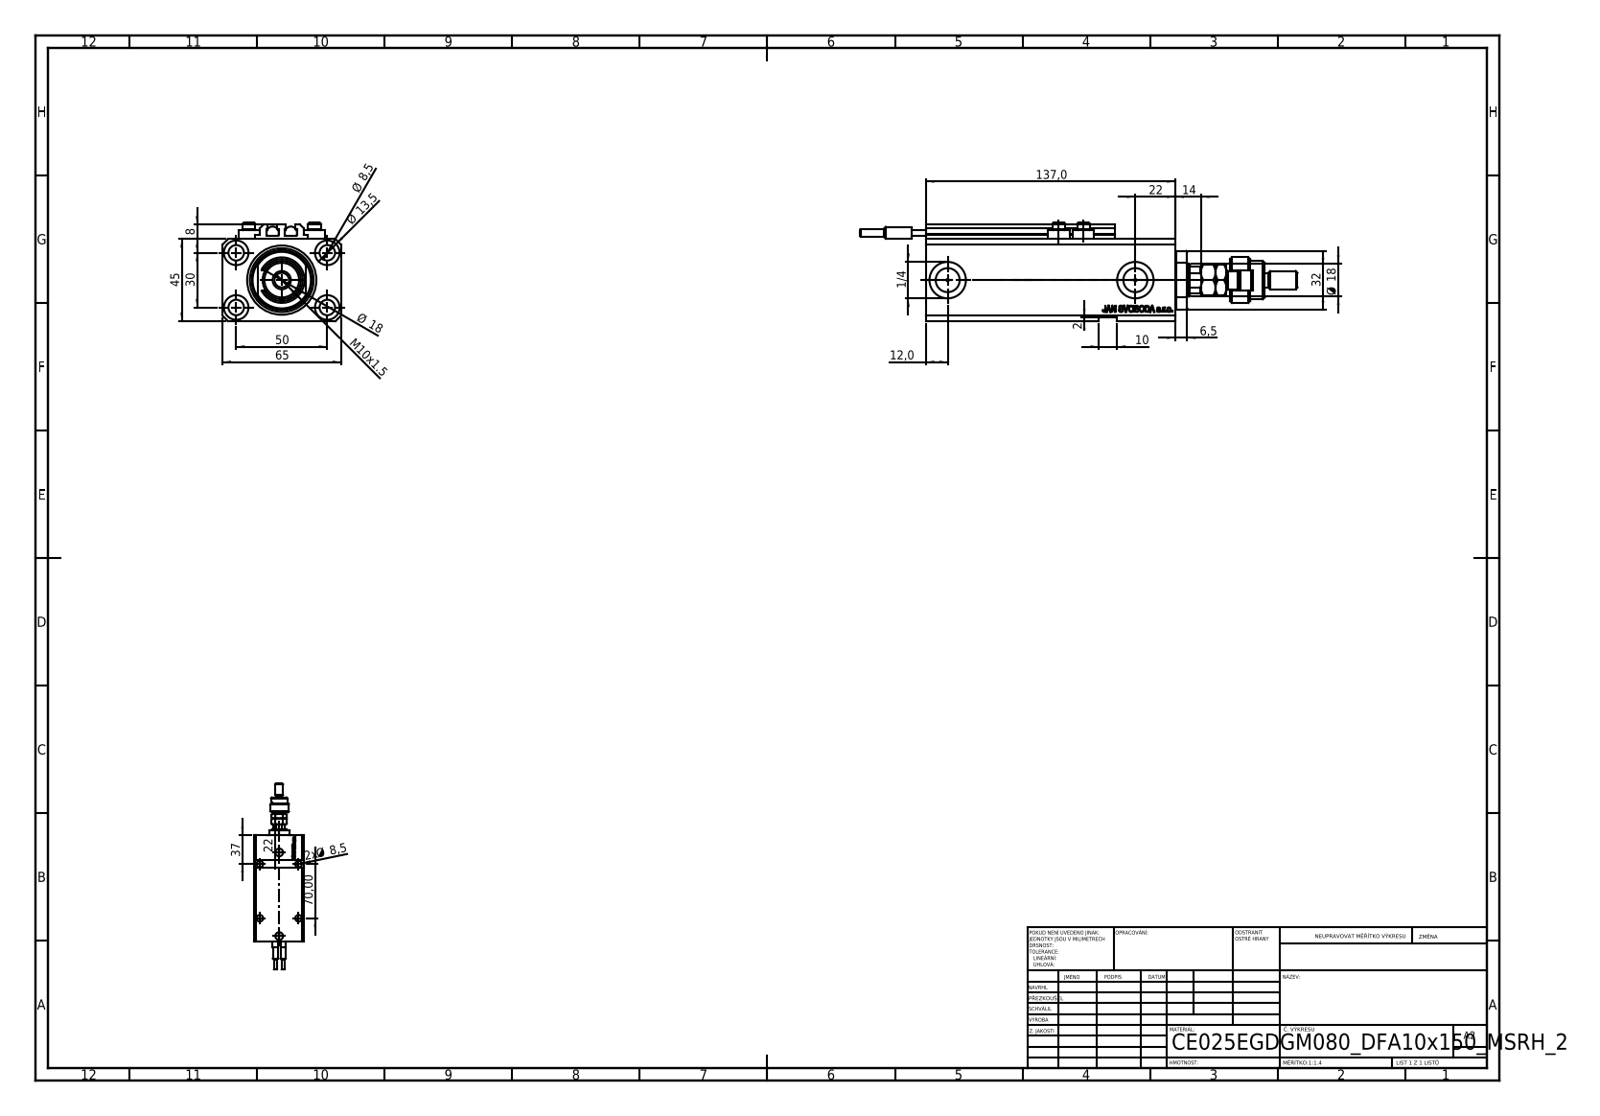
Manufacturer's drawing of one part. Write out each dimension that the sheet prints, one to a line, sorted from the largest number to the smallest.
137,0
70,00
65
50
45
37
32
30
22
22
Ø 18
Ø 18
14
Ø 13,5
12,0
M10x1.5
10
Ø 8,5
2x Ø 8,5
8
6,5
2
1/4
